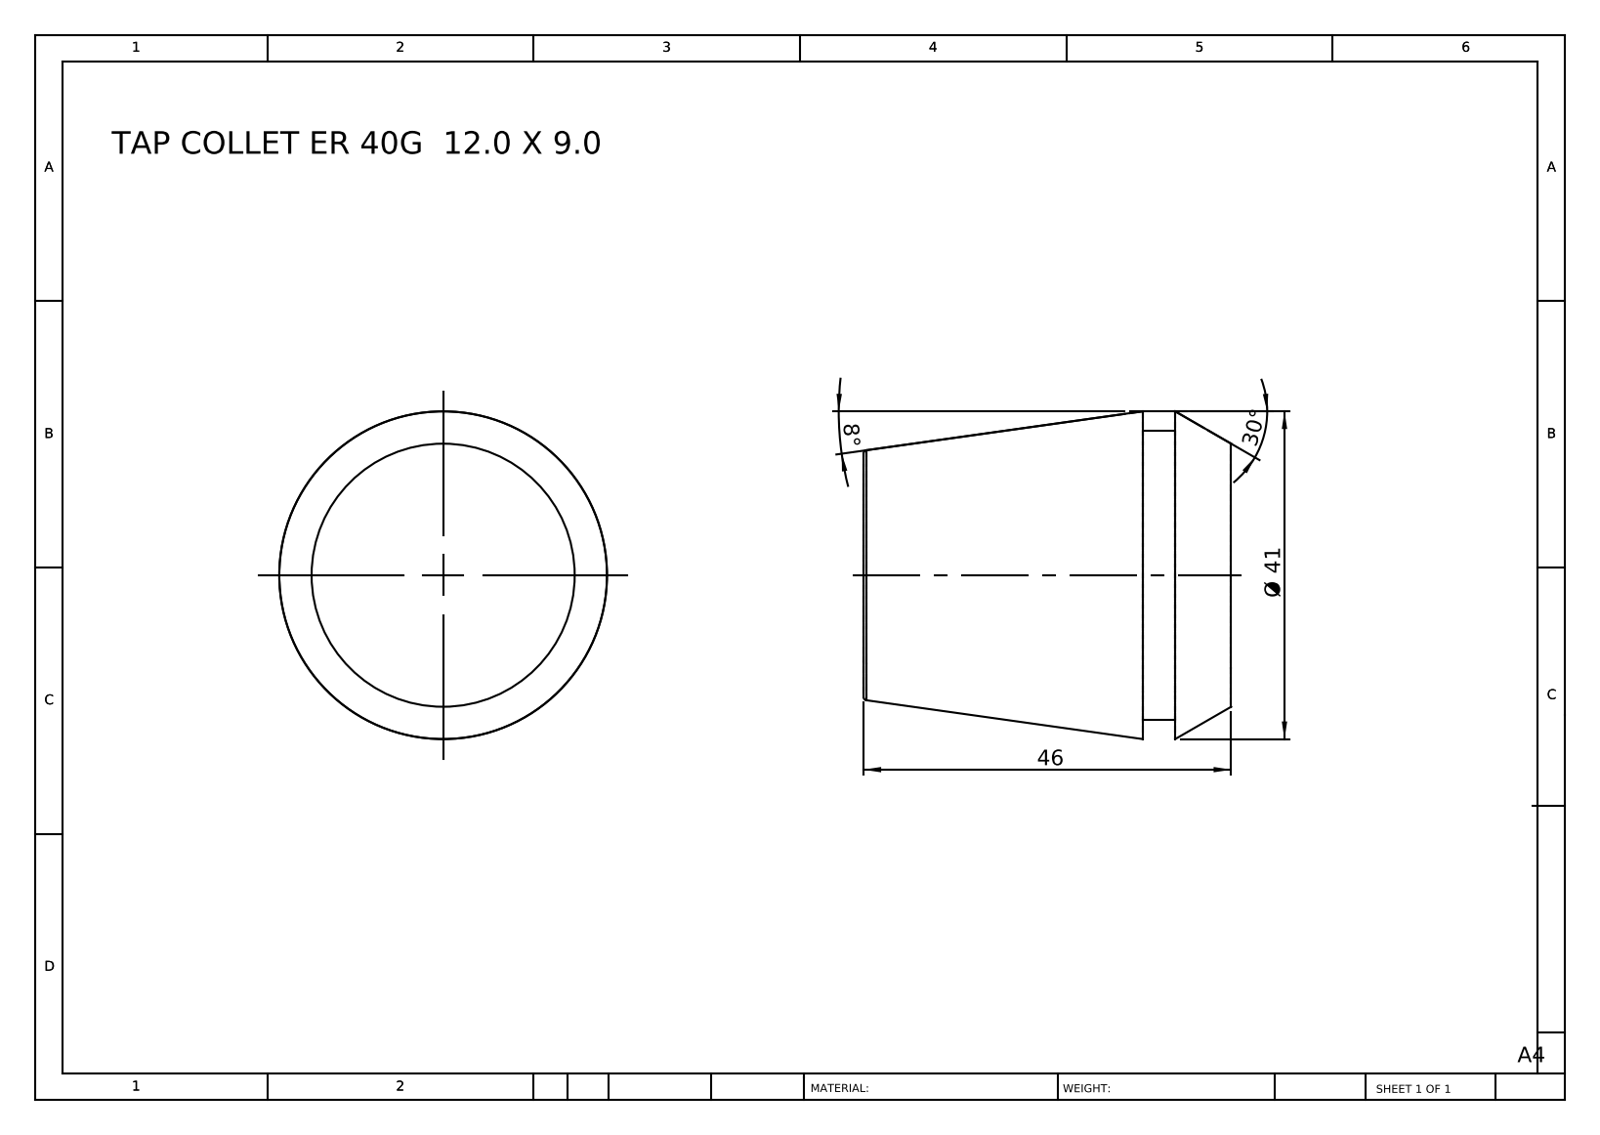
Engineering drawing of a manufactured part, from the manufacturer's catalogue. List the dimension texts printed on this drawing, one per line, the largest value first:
46
Ø 41
30°
8°
